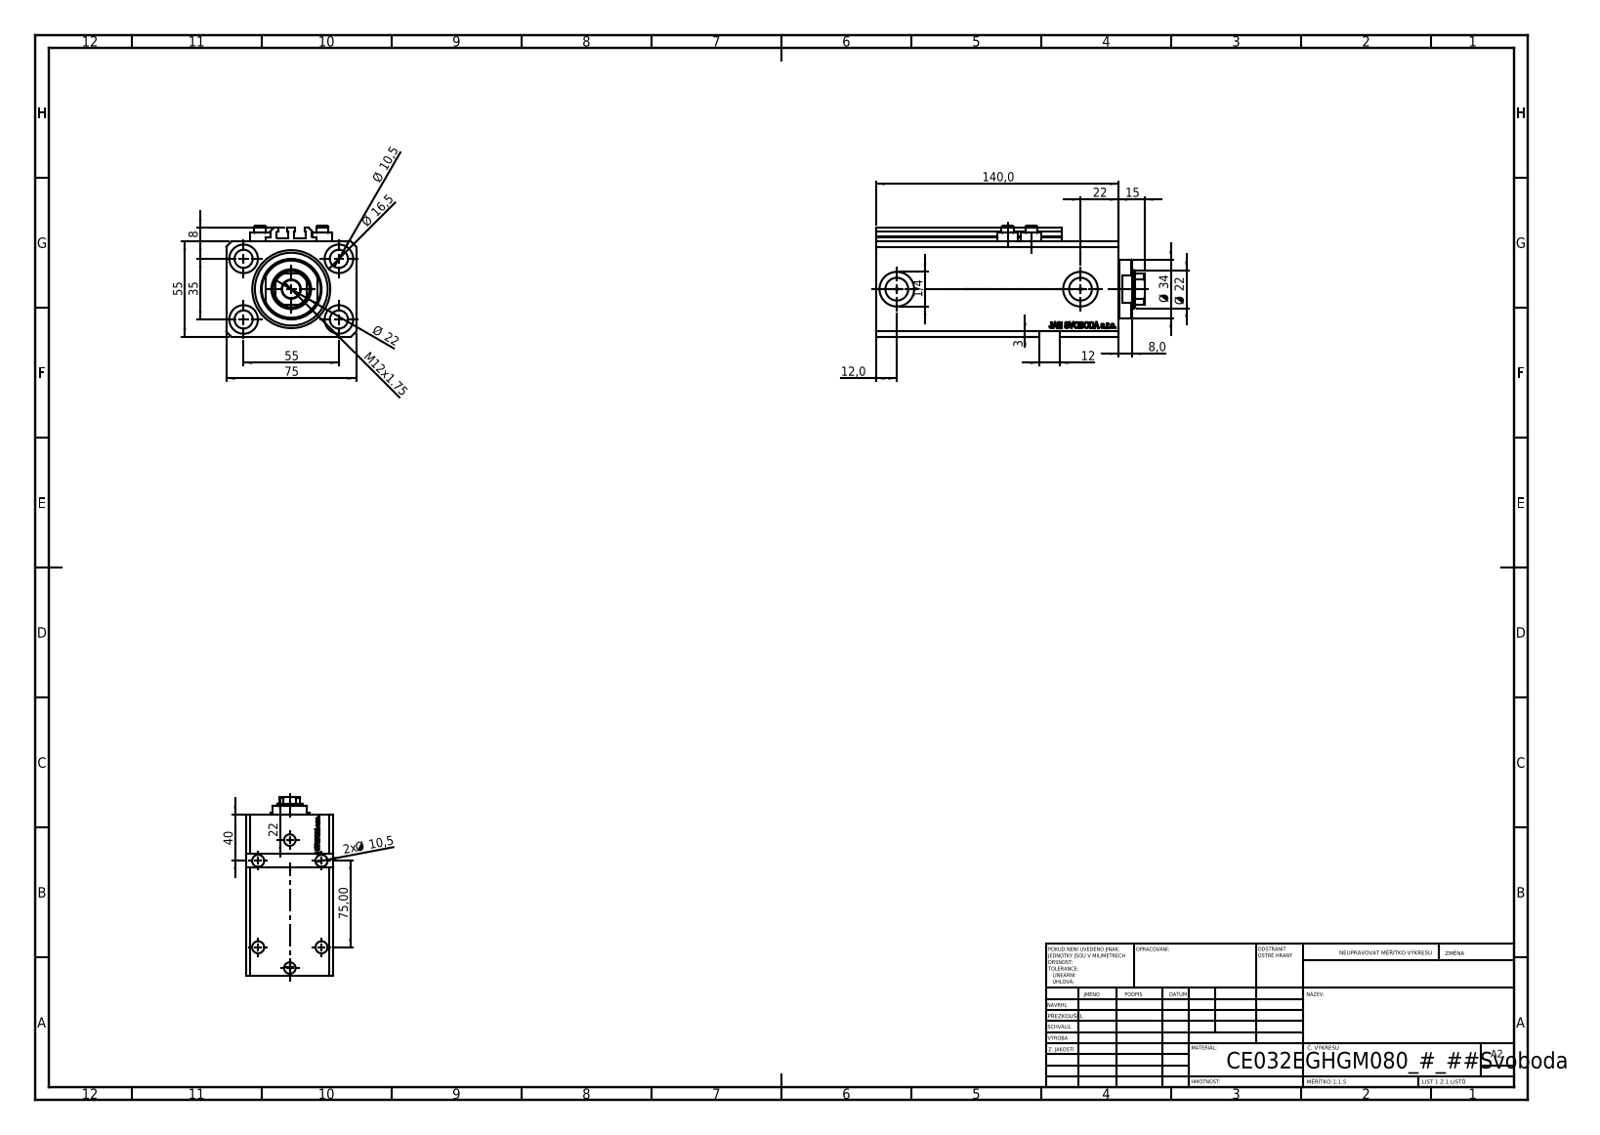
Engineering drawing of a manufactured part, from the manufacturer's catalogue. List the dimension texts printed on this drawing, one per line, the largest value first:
140,0
75
75,00
55
55
40
35
Ø 34
Ø 22
22
Ø 22
22
Ø 16,5
15
M12x1.75
12,0
12
Ø 10,5
2x Ø 10,5
8
8,0
3
1/4
